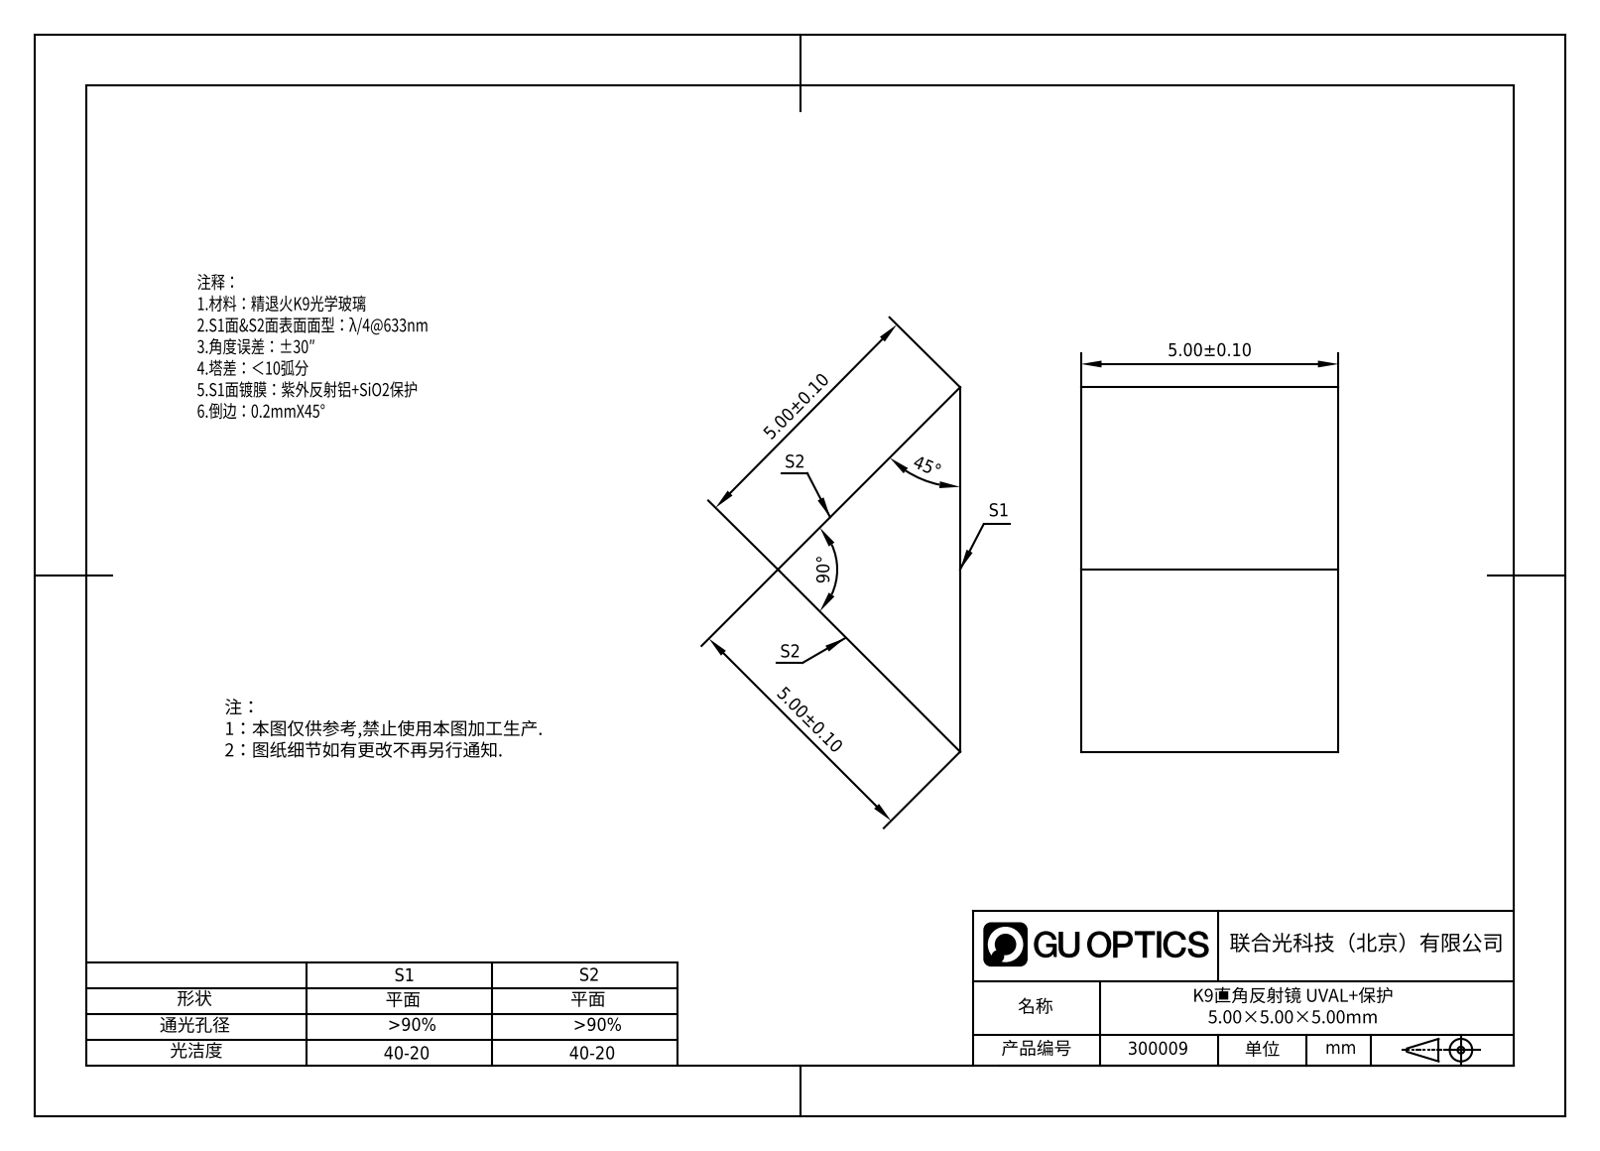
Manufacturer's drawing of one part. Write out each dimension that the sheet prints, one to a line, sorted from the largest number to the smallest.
90°
45°
5.00±0.10
5.00±0.10
5.00±0.10
